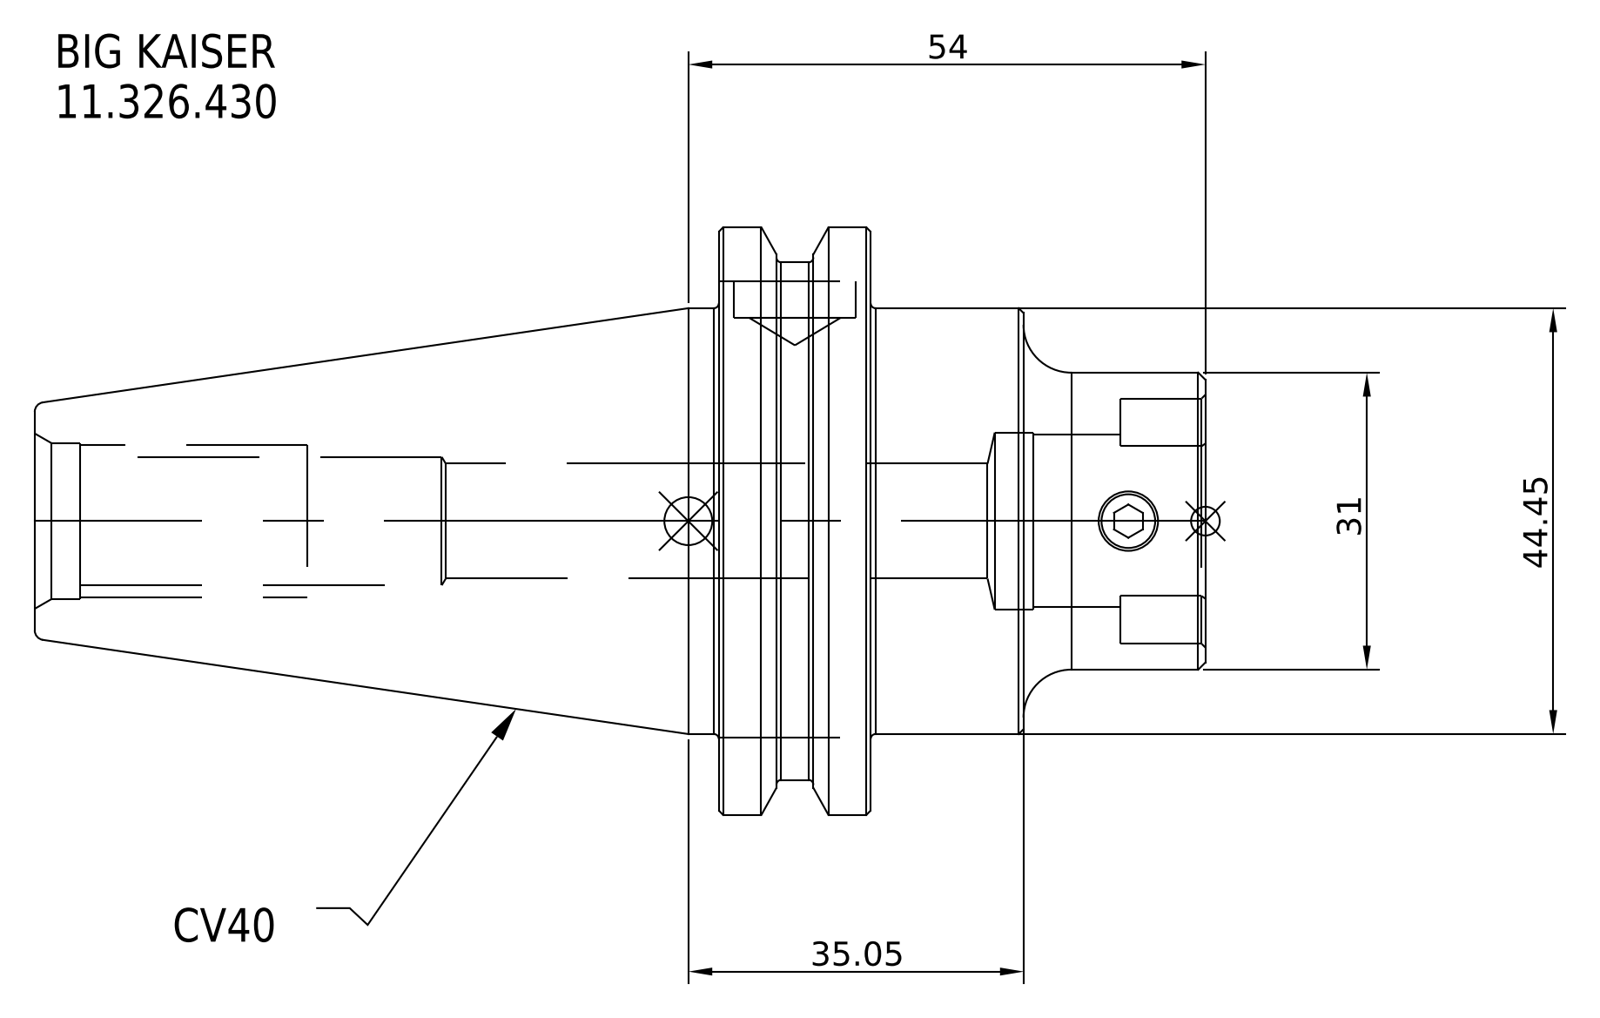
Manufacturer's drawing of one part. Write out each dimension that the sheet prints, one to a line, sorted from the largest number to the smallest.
54
44.45
35.05
31
